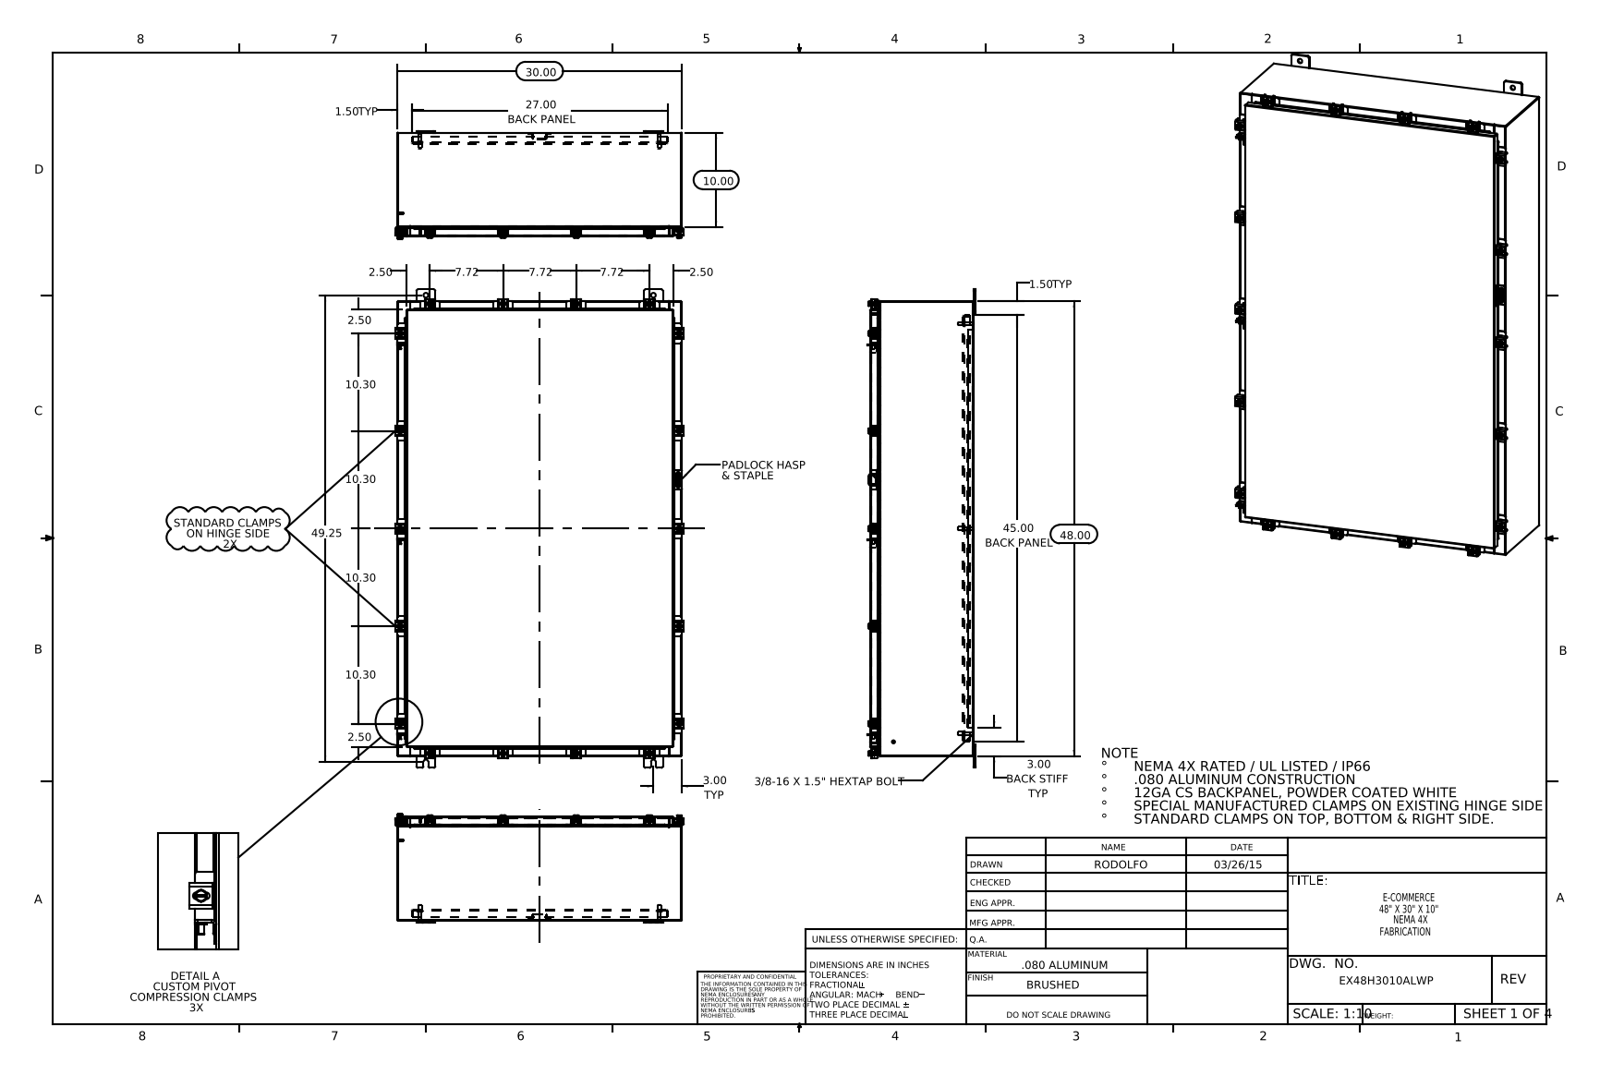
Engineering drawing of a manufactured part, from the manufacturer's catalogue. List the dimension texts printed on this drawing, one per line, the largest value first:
49.25
48.00
45.00 BACK PANEL
30.00
27.00 BACK PANEL
10.30
10.30
10.30
10.30
10.00
7.72
7.72
7.72
3.00 TYP
3.00 BACK STIFF TYP
2.50
2.50
2.50
2.50
1.50 TYP
1.50 TYP
